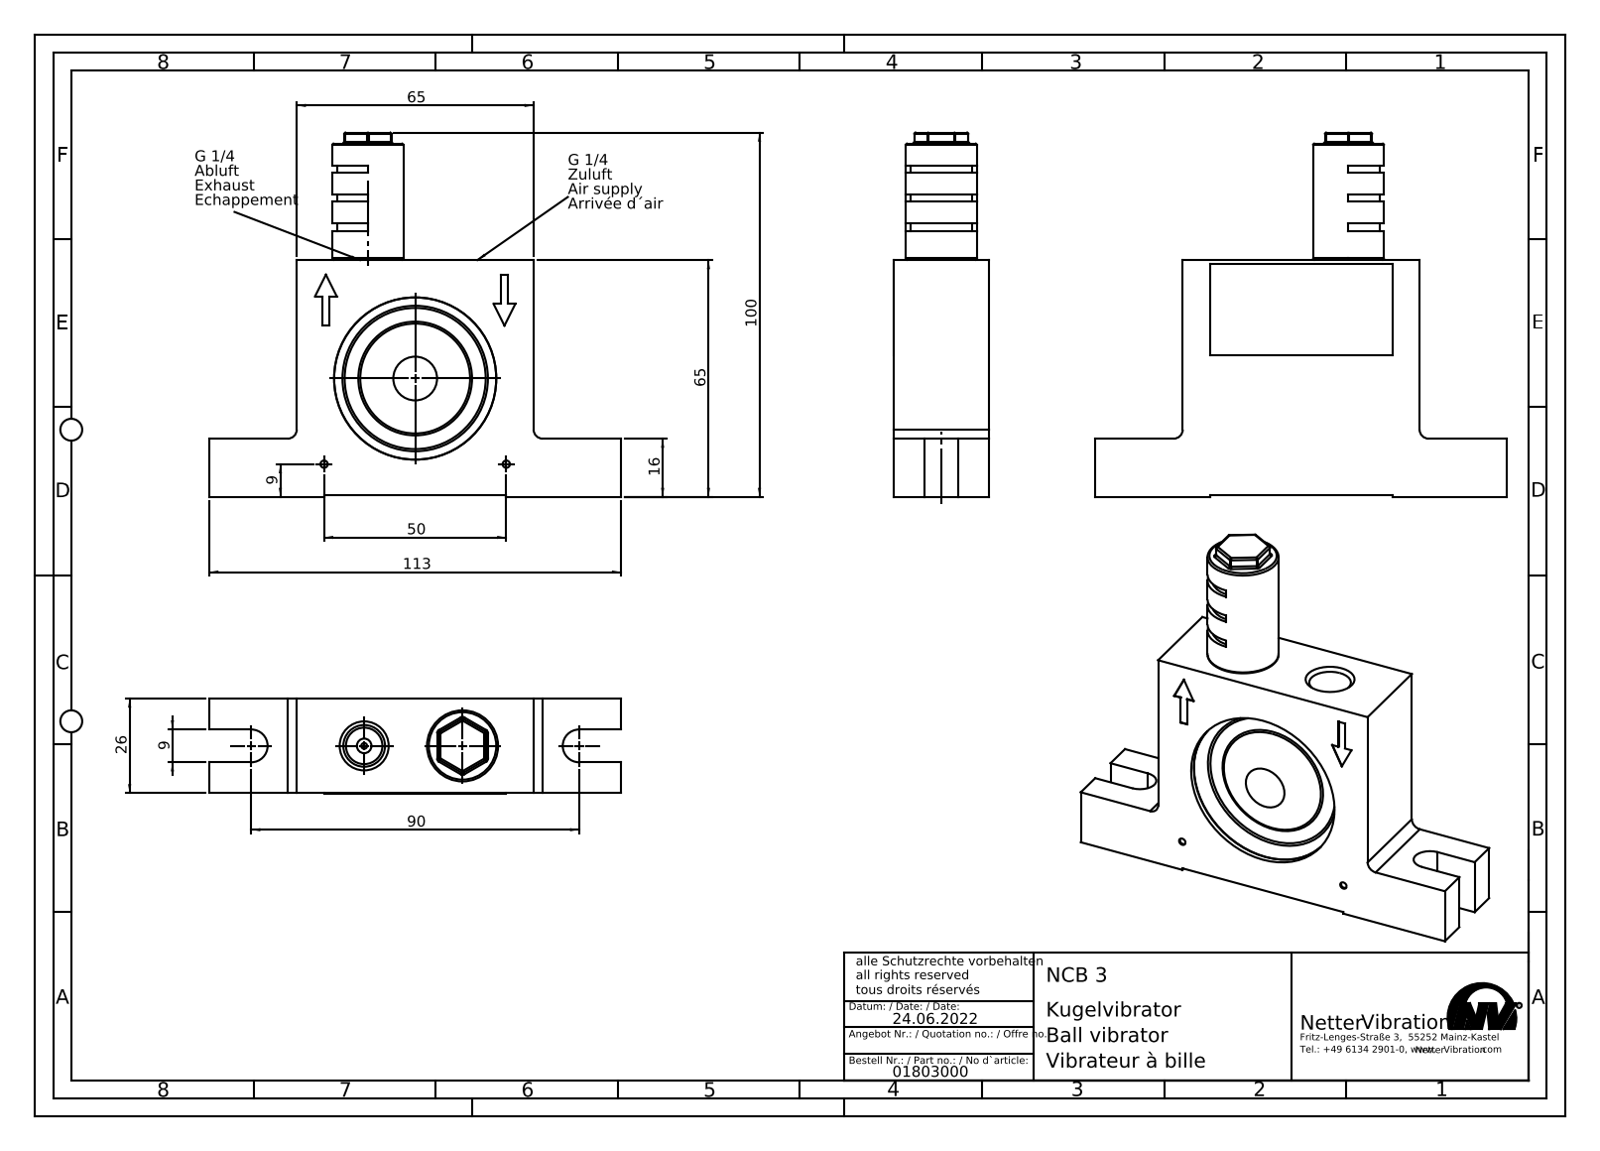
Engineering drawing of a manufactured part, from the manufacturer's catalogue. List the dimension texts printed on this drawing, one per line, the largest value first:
113
100
90
65
65
50
26
16
9
9
